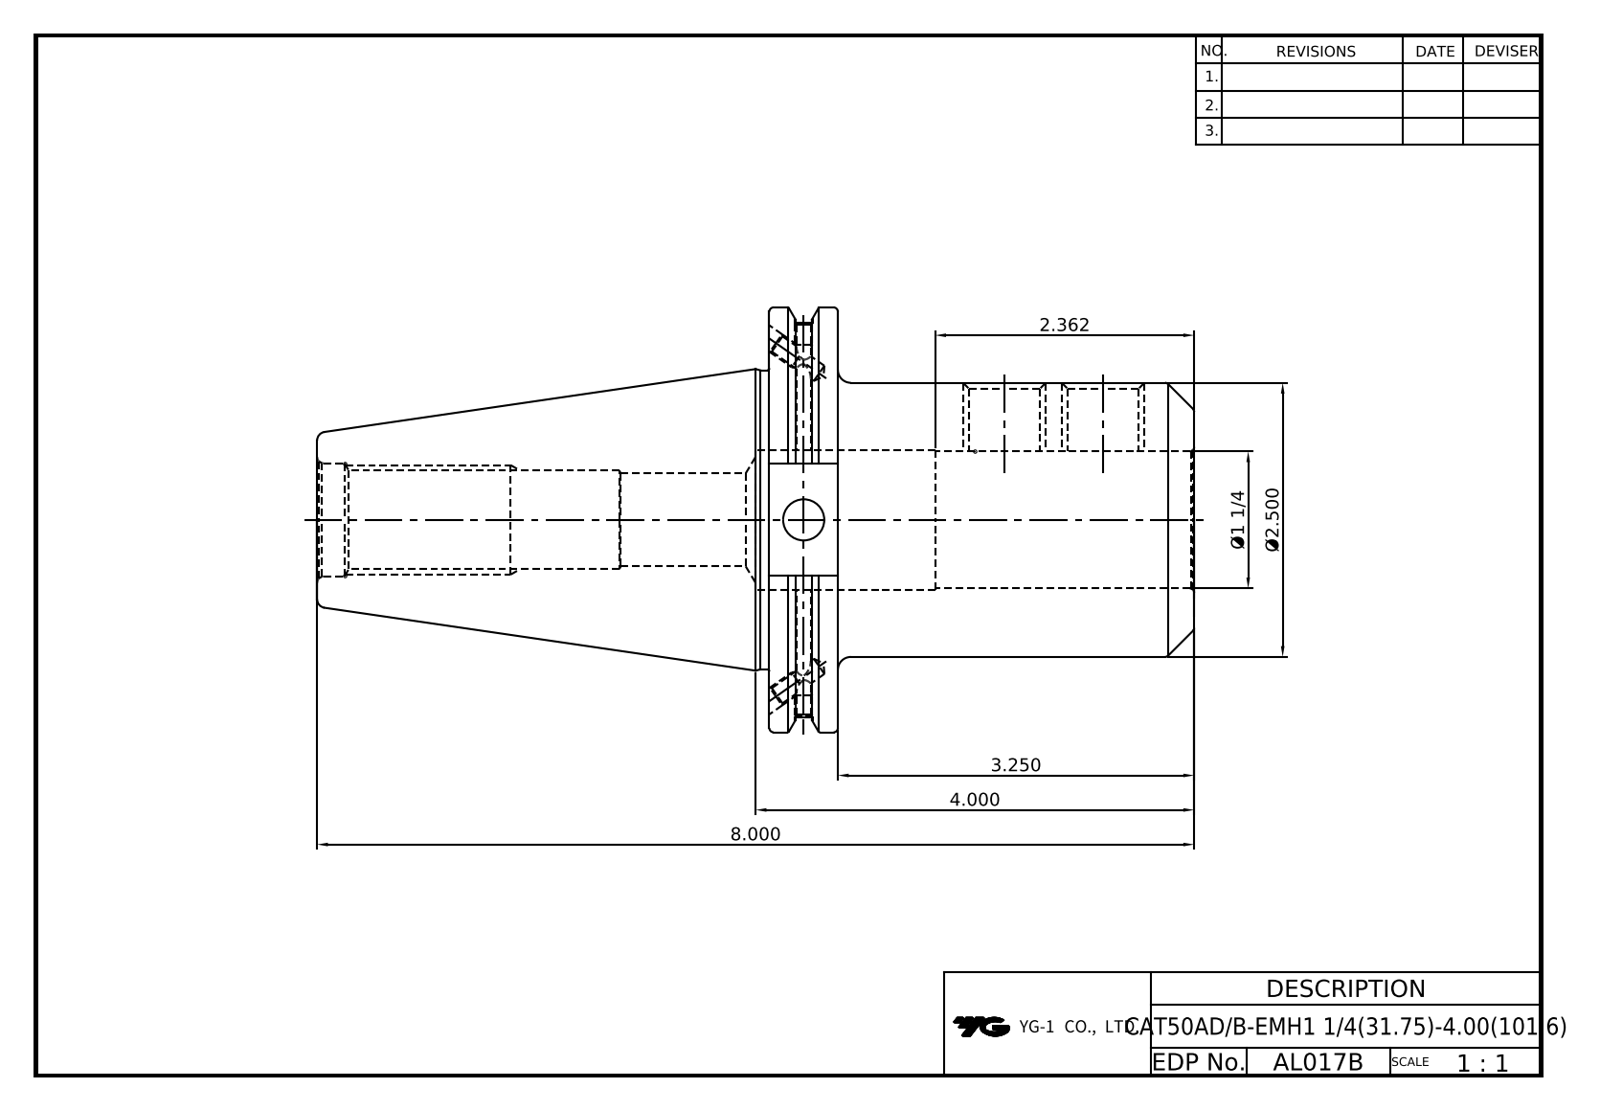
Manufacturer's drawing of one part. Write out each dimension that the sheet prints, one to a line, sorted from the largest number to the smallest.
8.000
4.000
3.250
Ø2.500
2.362
Ø1 1/4
